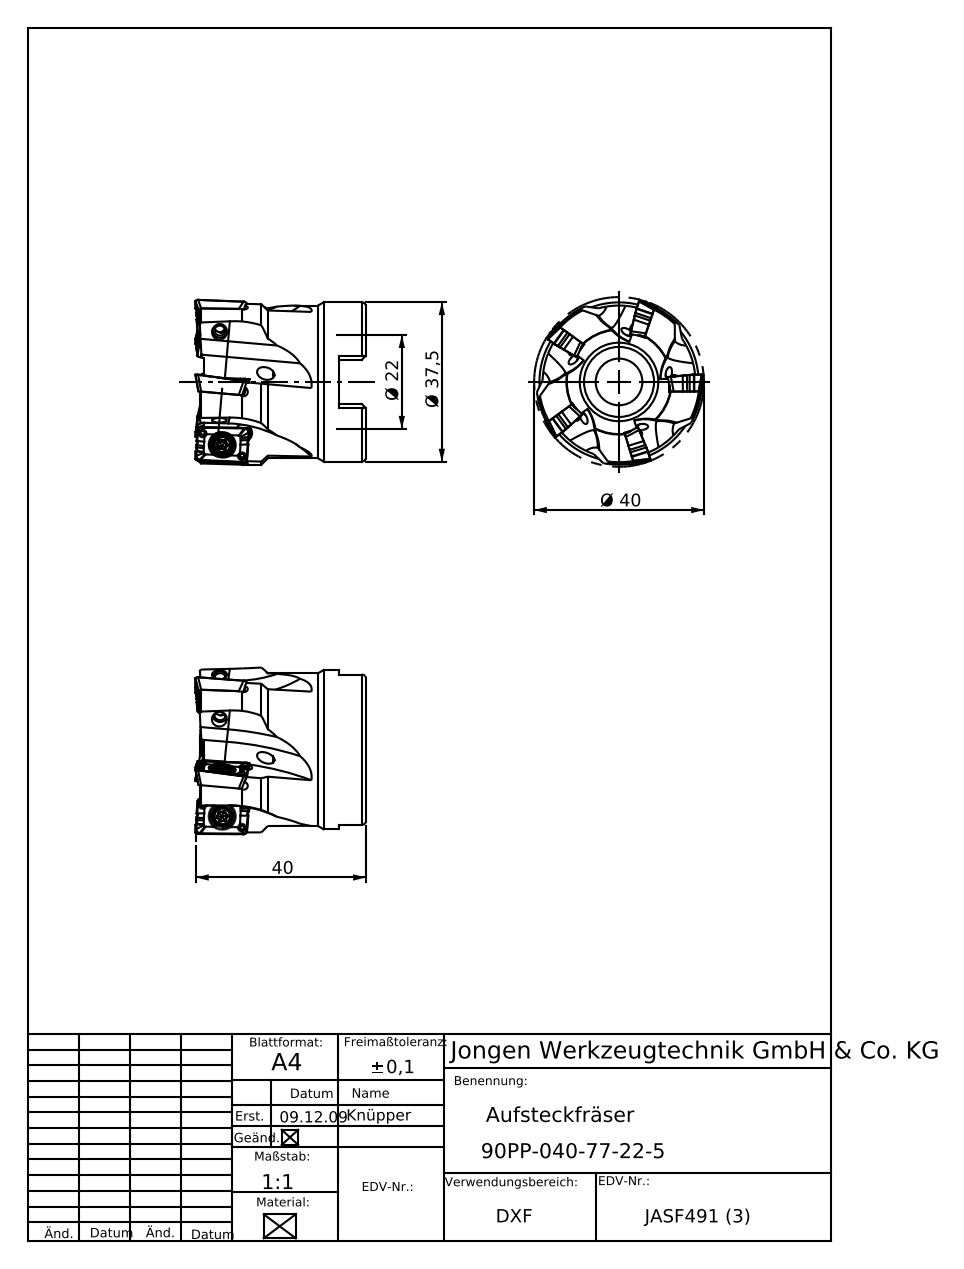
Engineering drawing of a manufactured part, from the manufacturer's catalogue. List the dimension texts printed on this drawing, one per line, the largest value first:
40
Ø 40
Ø 37,5
Ø 22
